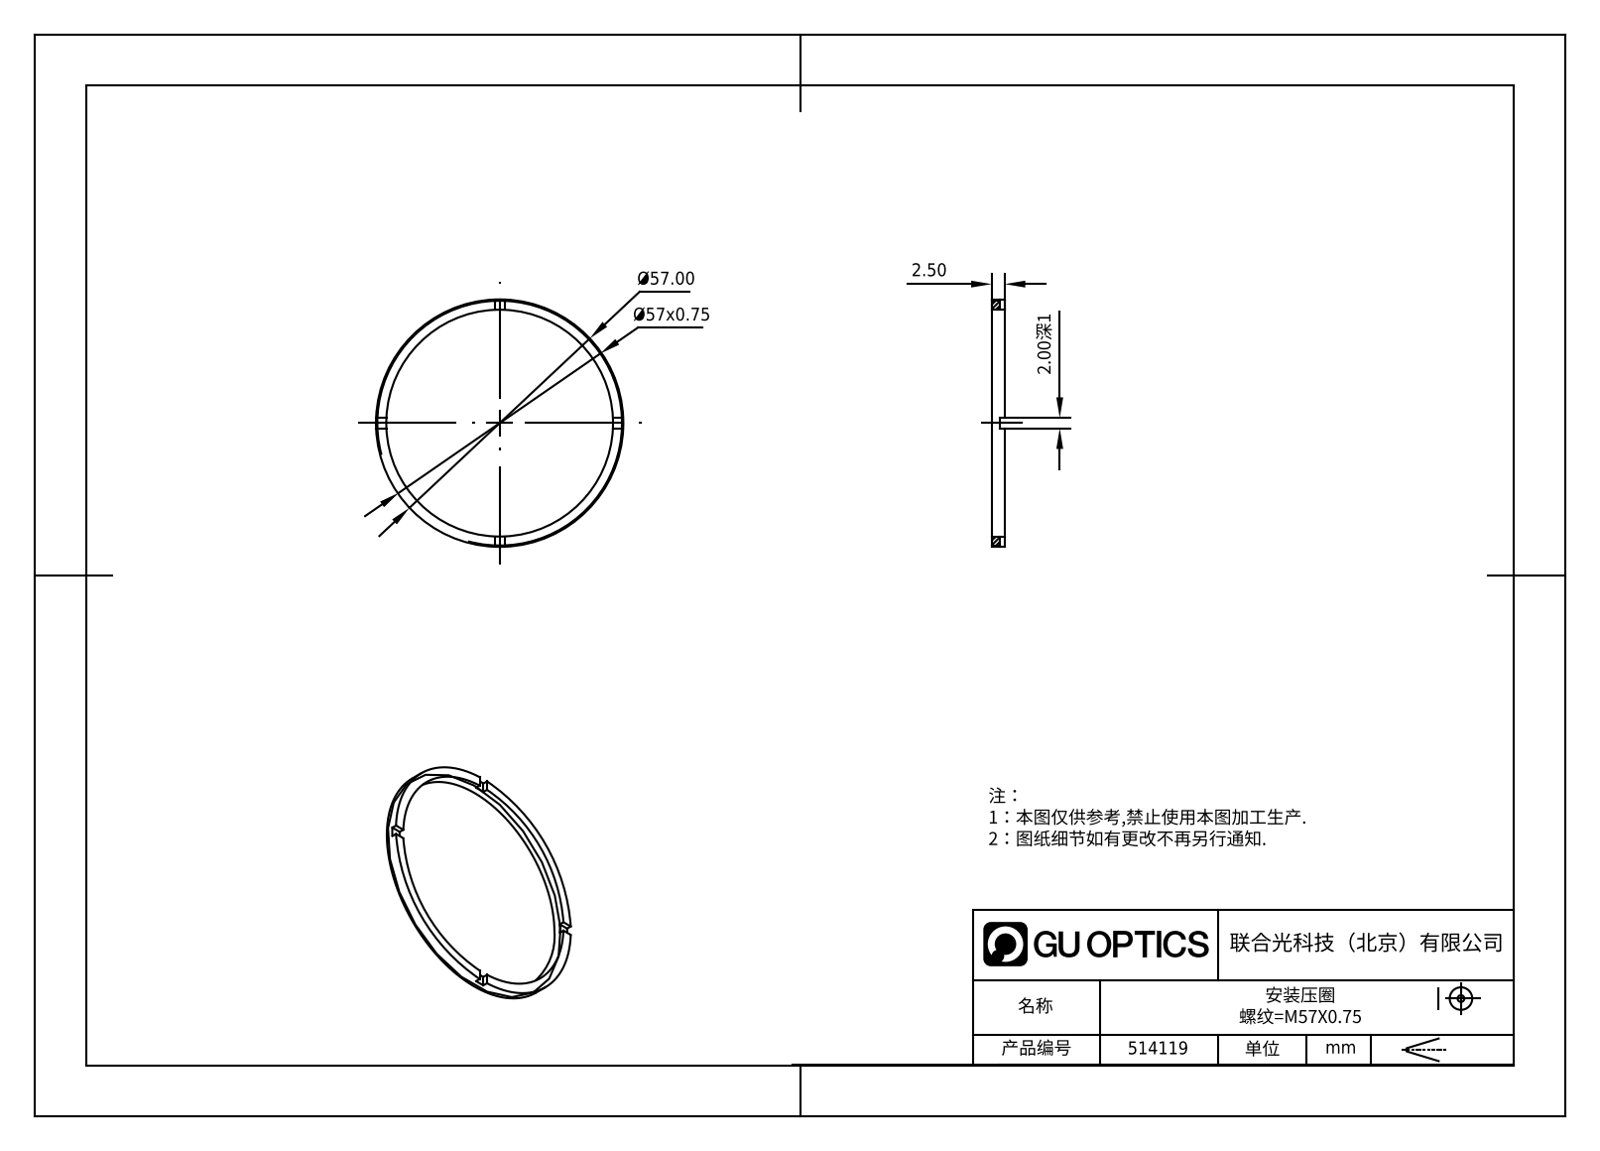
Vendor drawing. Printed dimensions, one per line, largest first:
Ø57.00
Ø57x0.75
2.50
2.00深1
